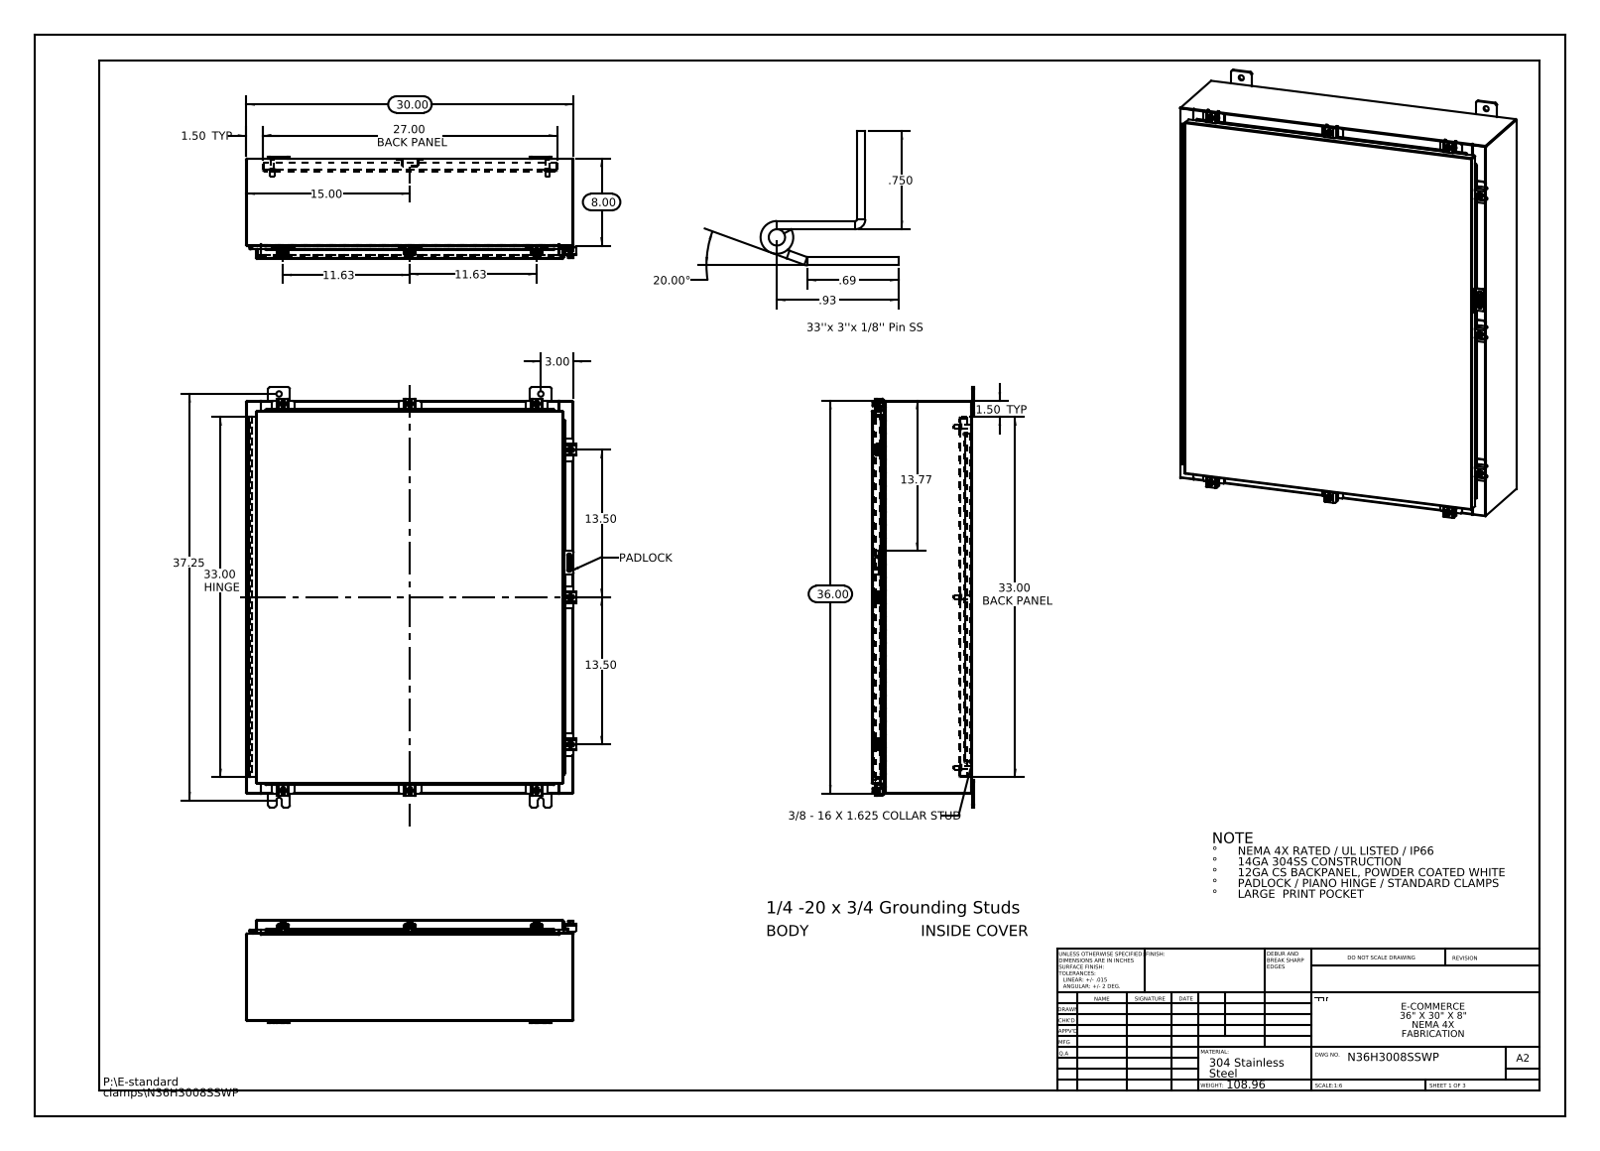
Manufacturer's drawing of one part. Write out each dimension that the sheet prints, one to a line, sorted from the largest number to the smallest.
37.25
36.00
33.00 HINGE
33.00 BACK PANEL
30.00
27.00 BACK PANEL
20.00°
15.00
13.77
13.50
13.50
11.63
11.63
8.00
3.00
1.50 TYP
1.50 TYP
.93
.750
.69
